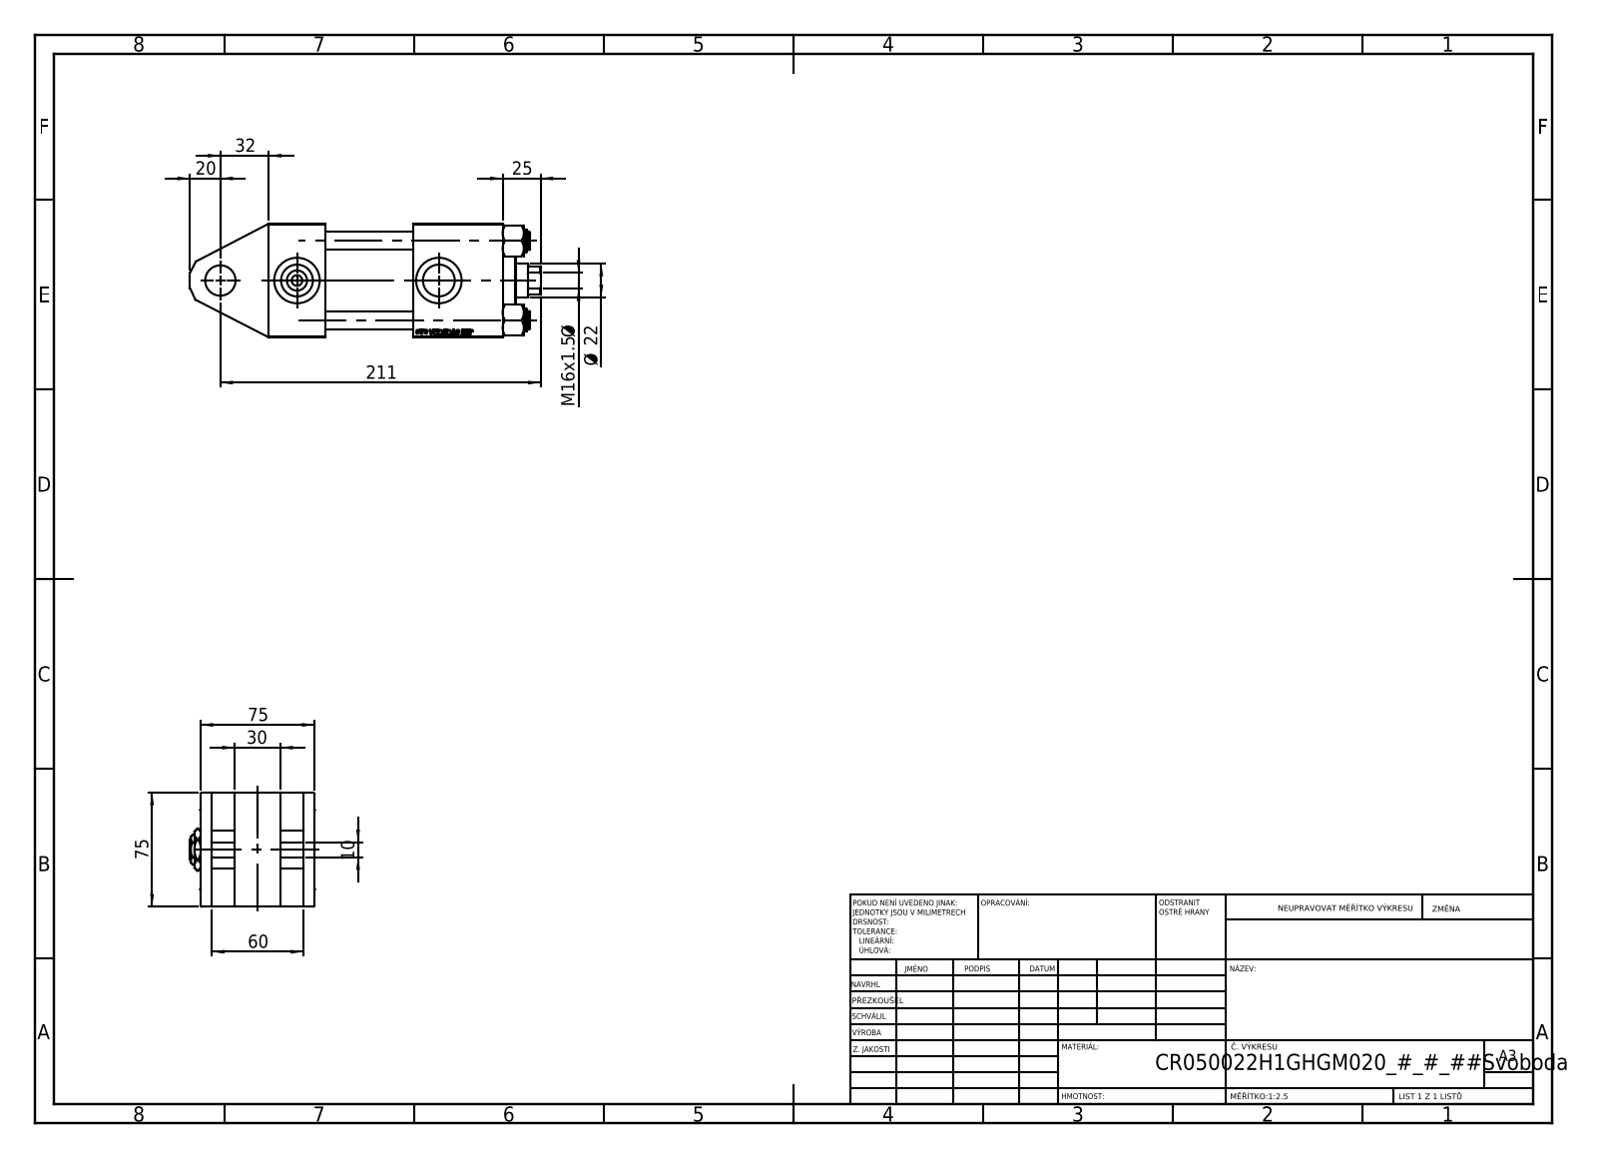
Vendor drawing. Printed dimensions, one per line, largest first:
211
75
75
60
32
30
25
Ø 22
20
M16x1.5 Ø
10
